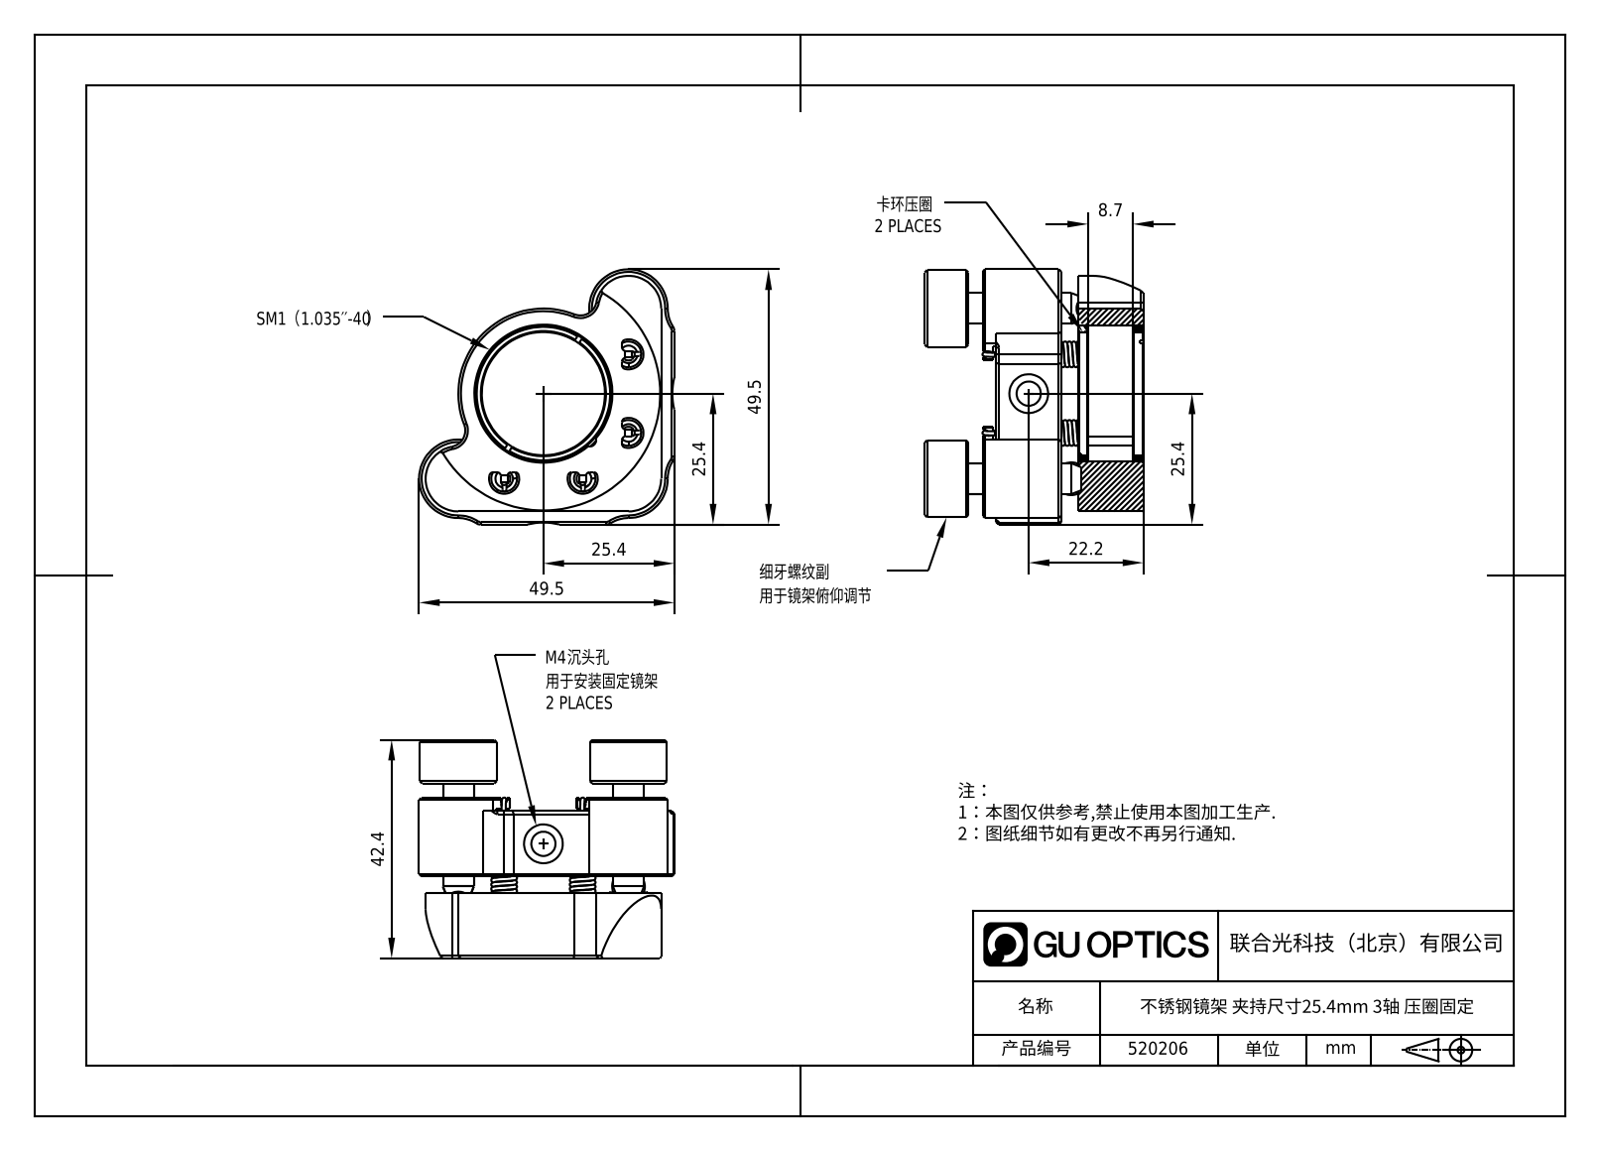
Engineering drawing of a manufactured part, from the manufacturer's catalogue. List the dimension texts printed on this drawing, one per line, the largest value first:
49.5
49.5
42.4
25.4
25.4
25.4
22.2
8.7
